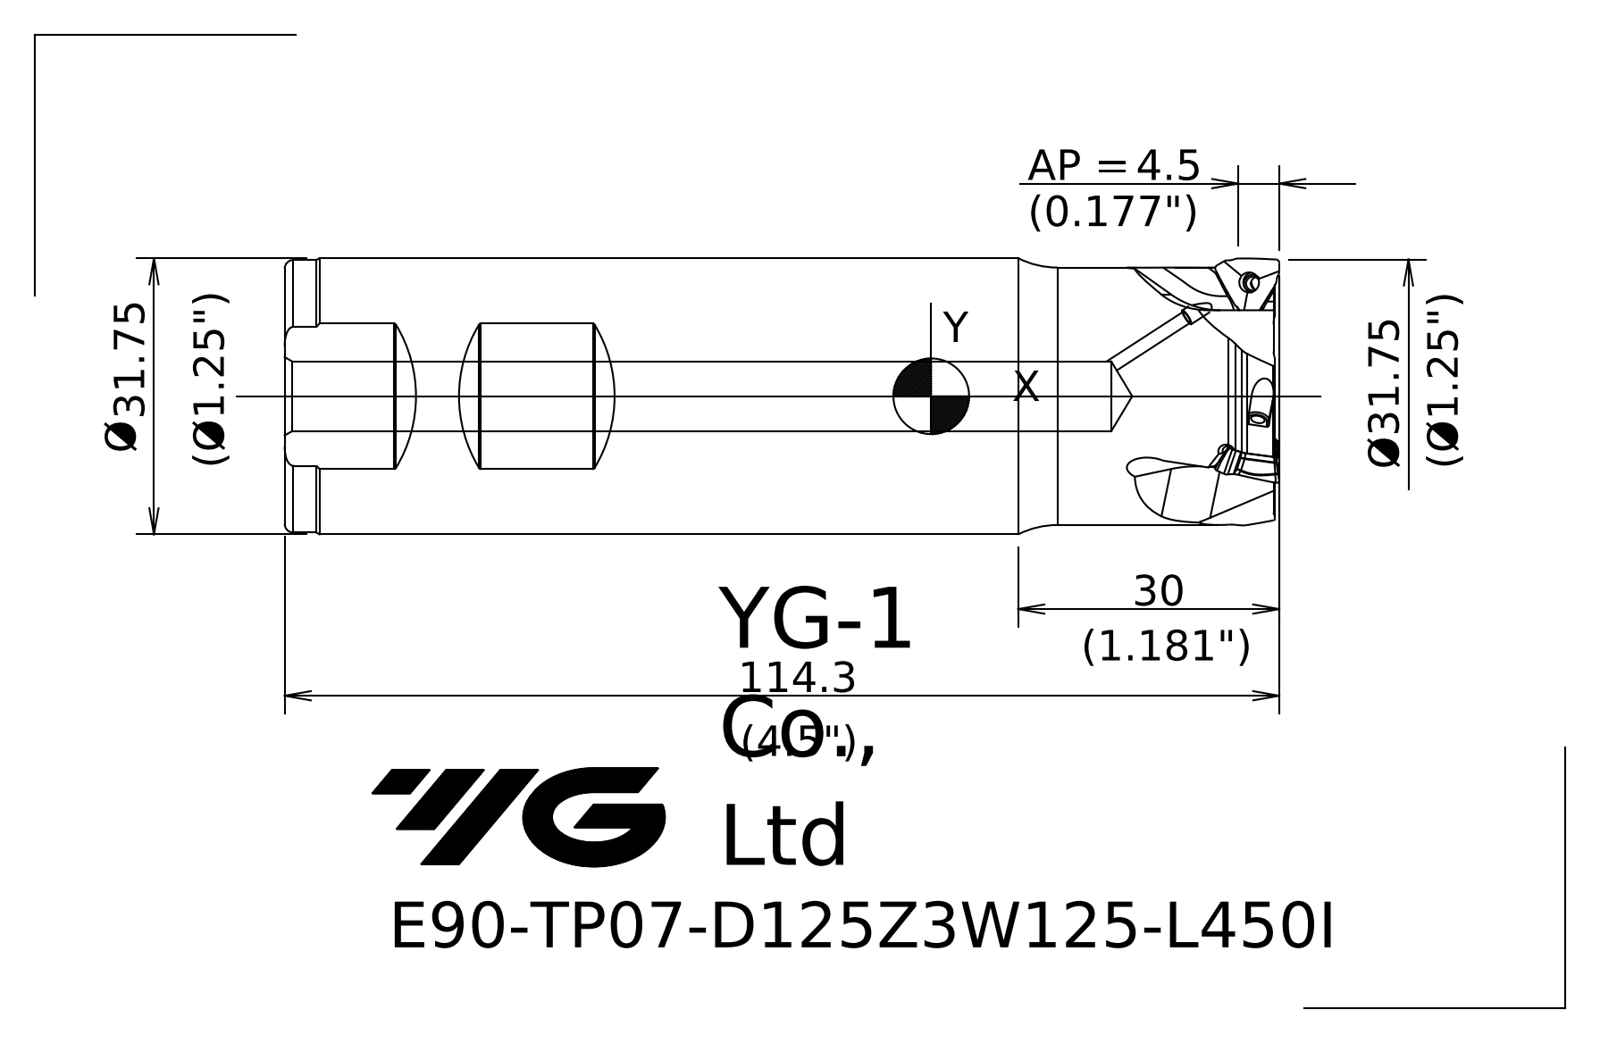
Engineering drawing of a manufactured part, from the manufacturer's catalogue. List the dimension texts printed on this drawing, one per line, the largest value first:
114.3
Ø31.75
30
4.5 AP =
